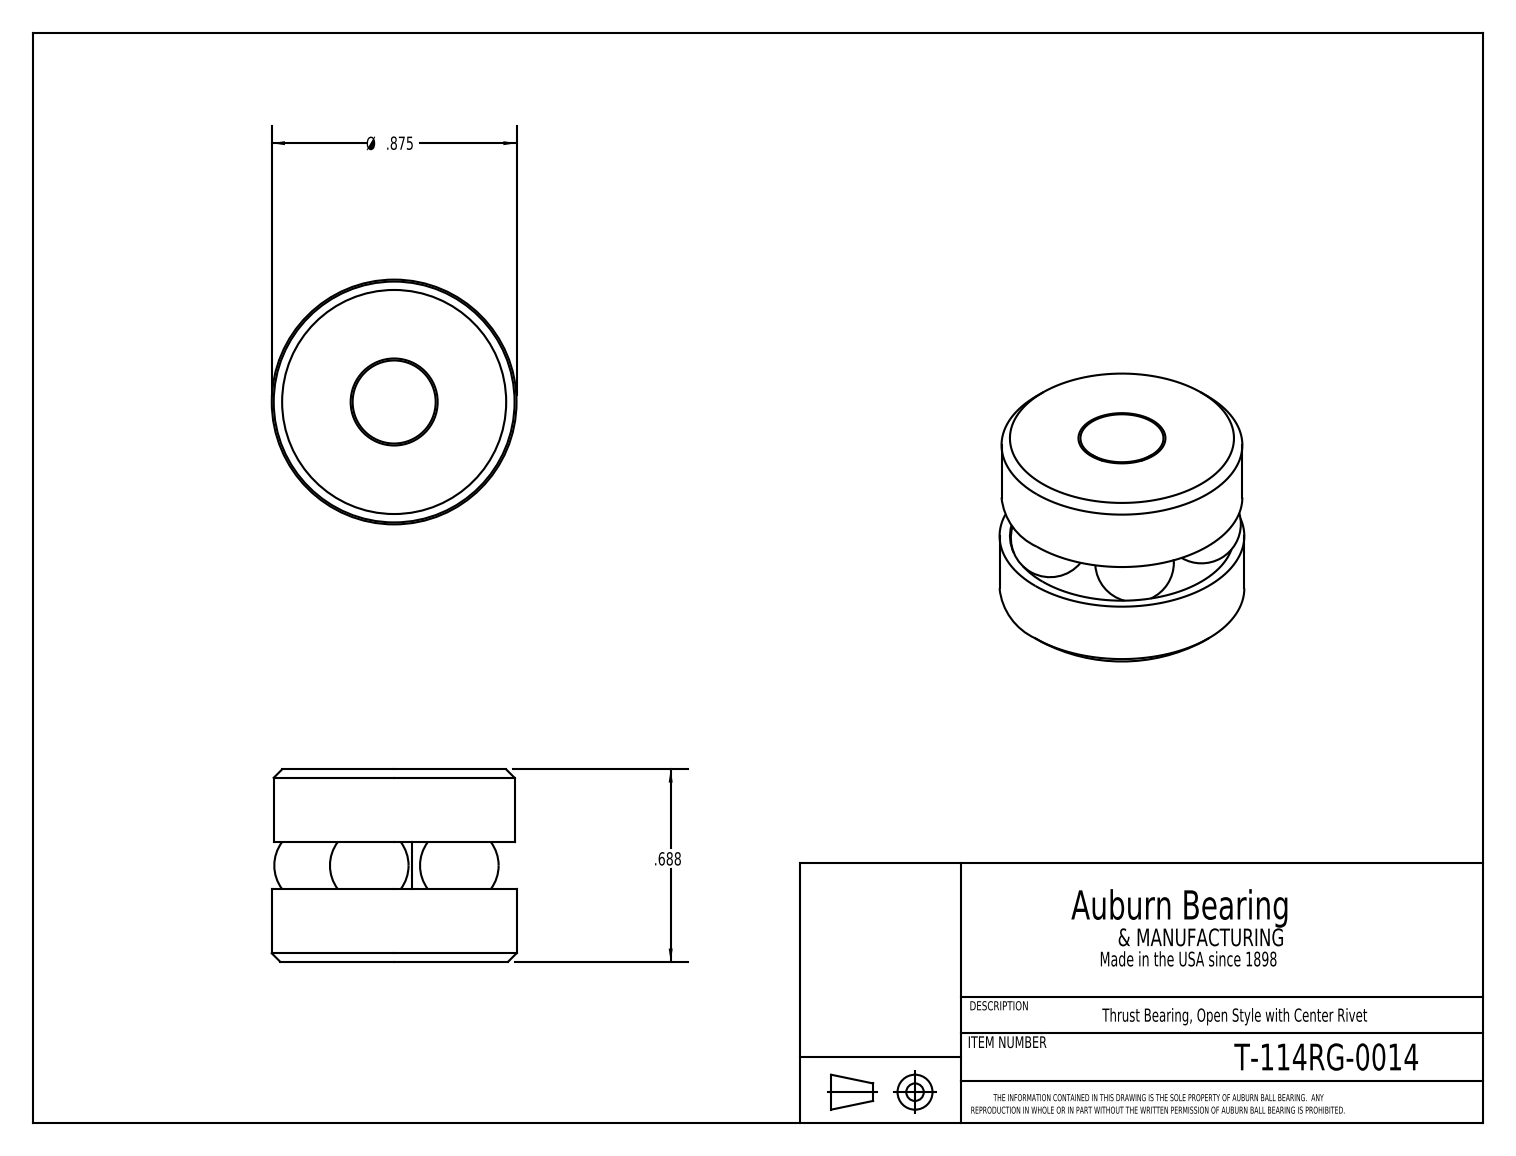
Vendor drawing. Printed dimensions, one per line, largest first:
Ø .875
.688
